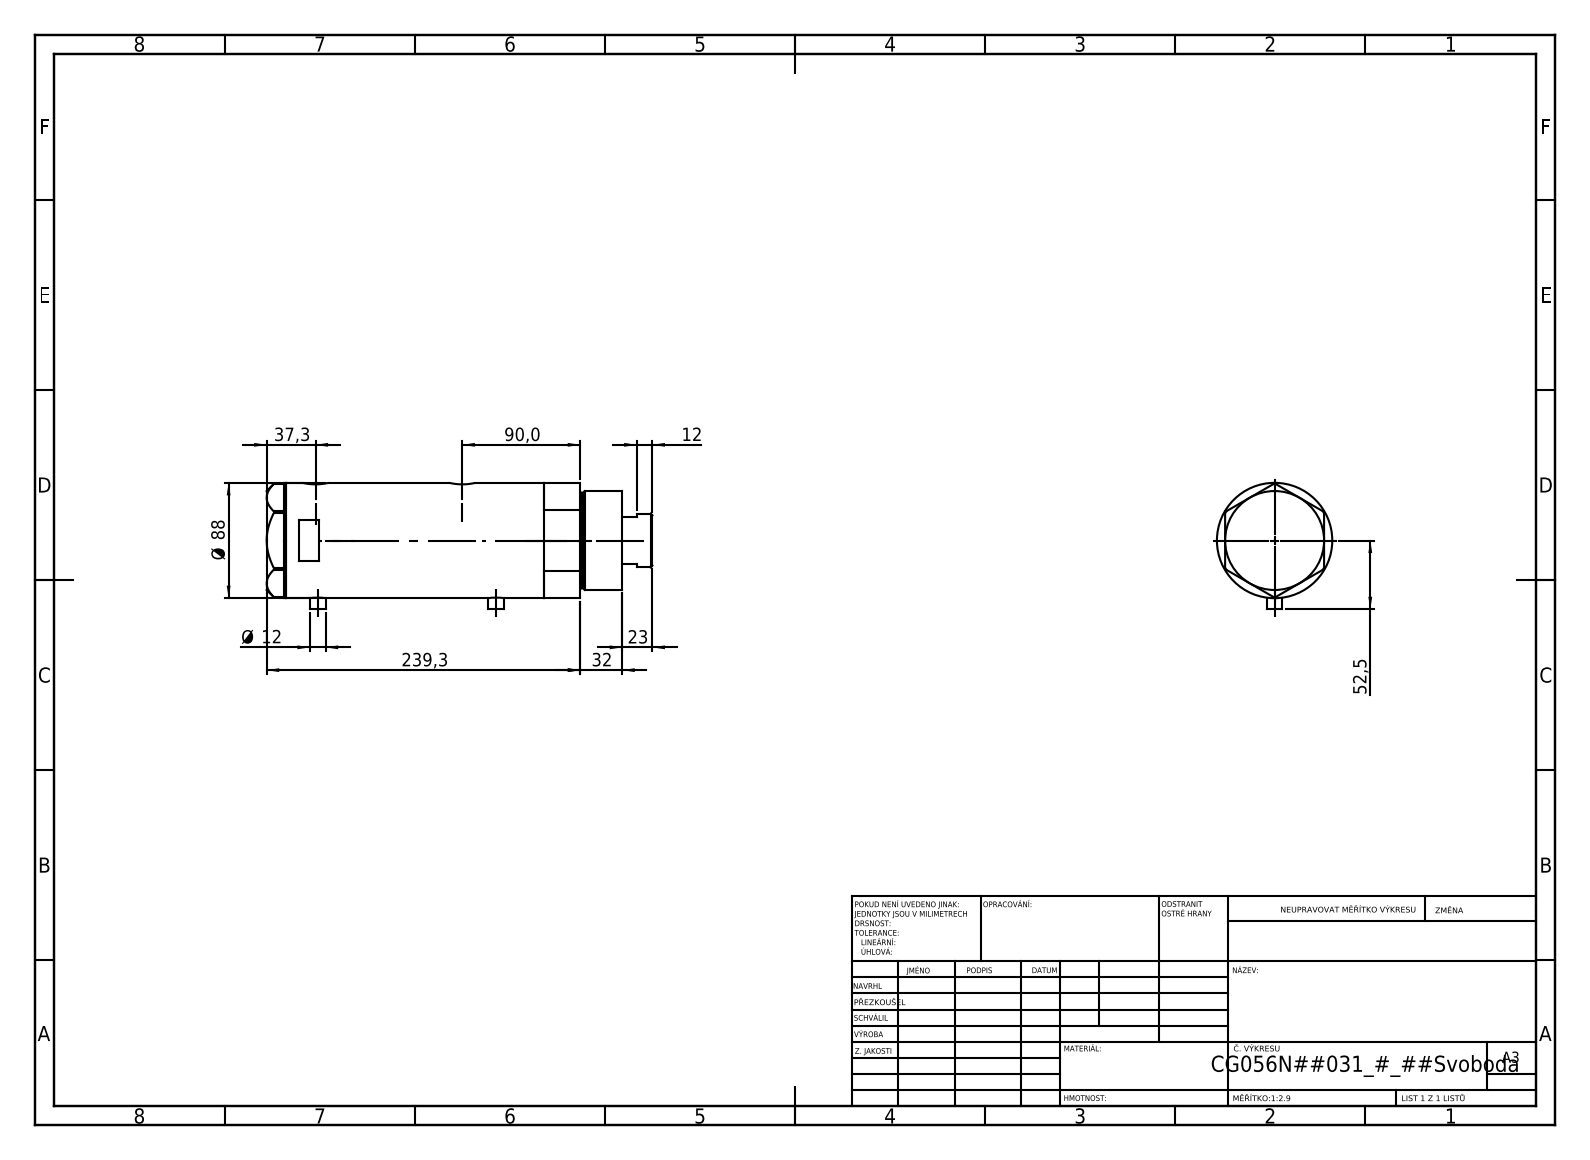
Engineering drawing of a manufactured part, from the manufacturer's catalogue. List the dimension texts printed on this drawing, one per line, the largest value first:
239,3
90,0
Ø 88
52,5
37,3
32
23
12
Ø 12
